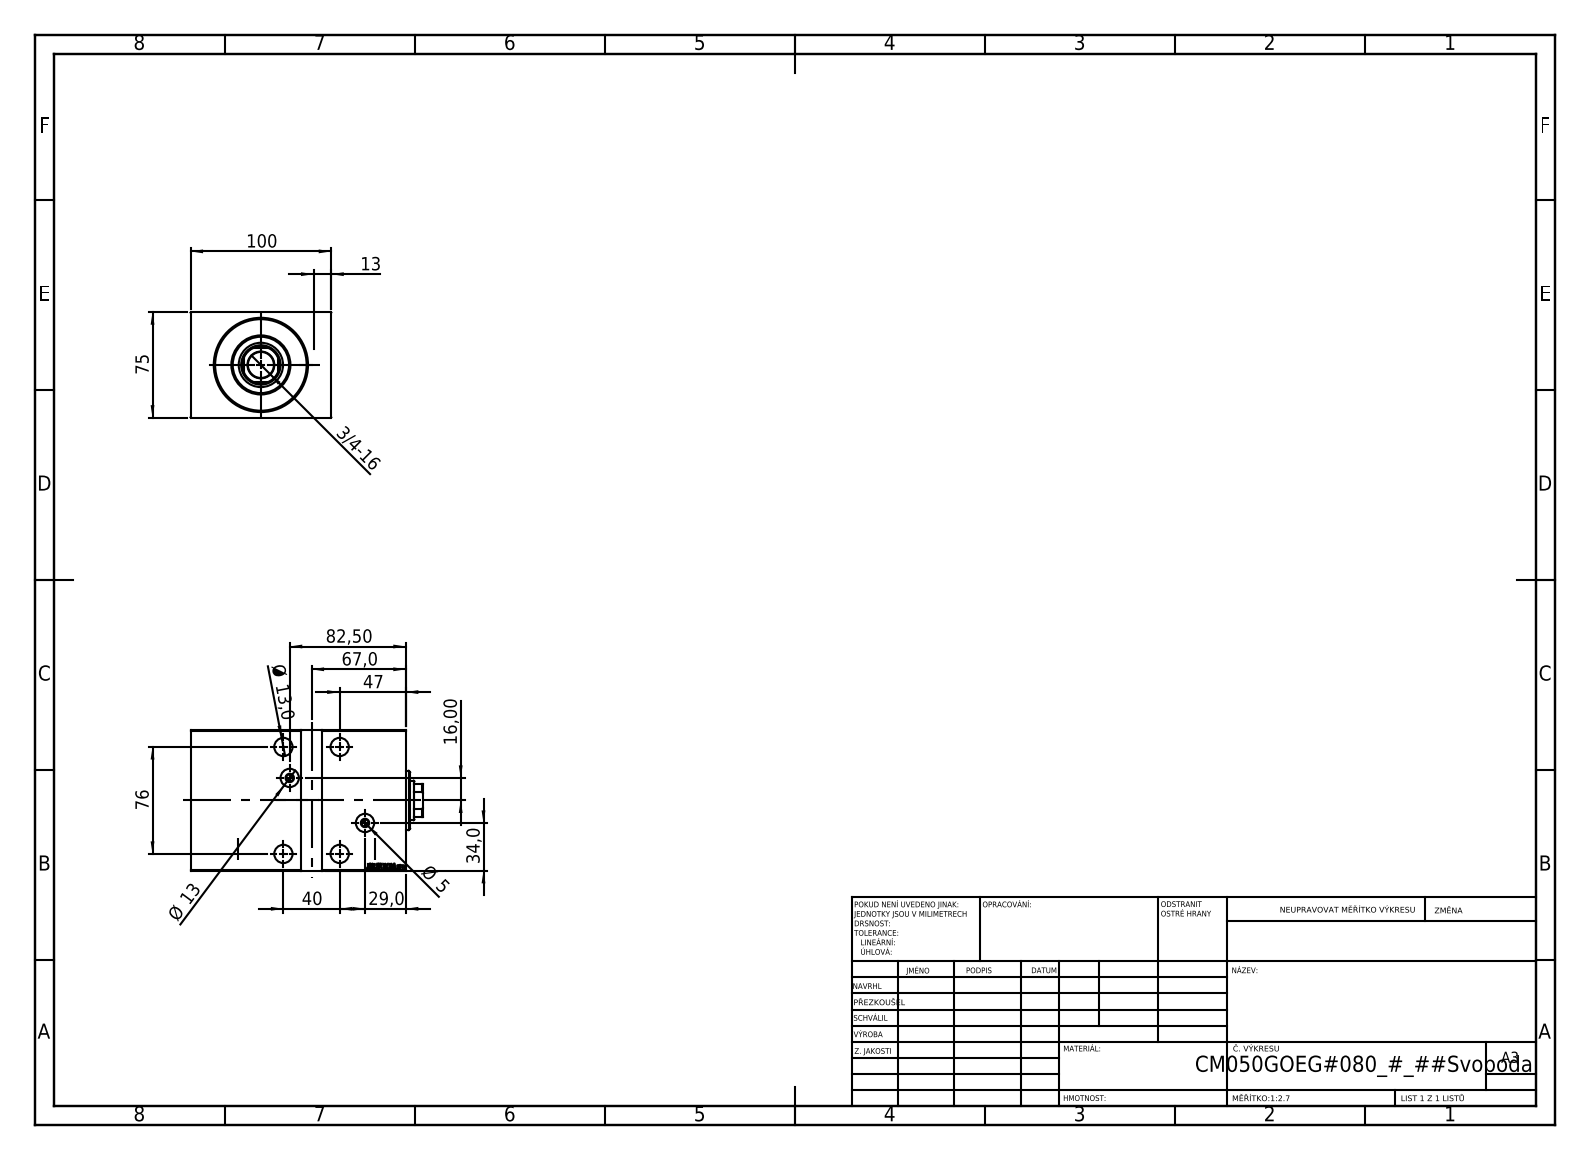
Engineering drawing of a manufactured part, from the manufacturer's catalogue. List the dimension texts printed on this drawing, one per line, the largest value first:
100
82,50
76
75
67,0
47
40
34,0
29,0
16,00
13
Ø 13,0
Ø 13
Ø 5
3/4-16
